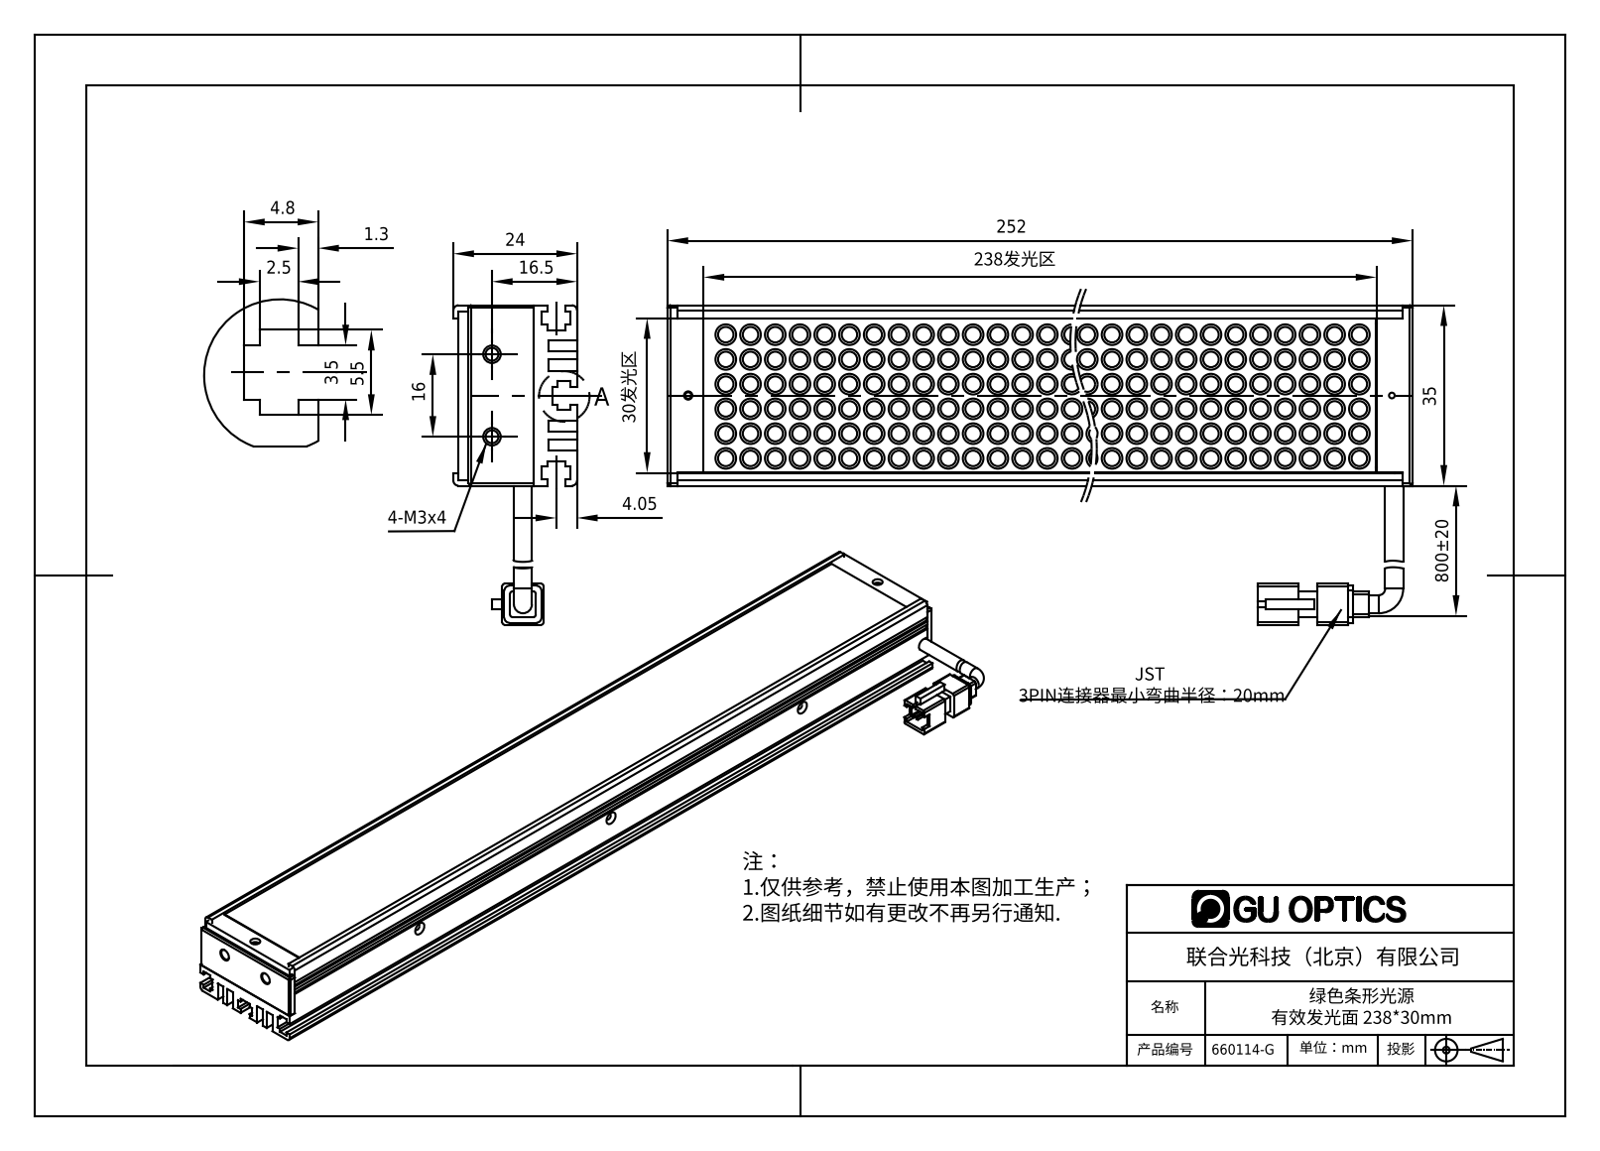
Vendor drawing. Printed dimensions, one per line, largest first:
800±20
252
238发光区
35
30发光区
24
16.5
16
5.5
4.8
4.05
3.5
2.5
1.3
